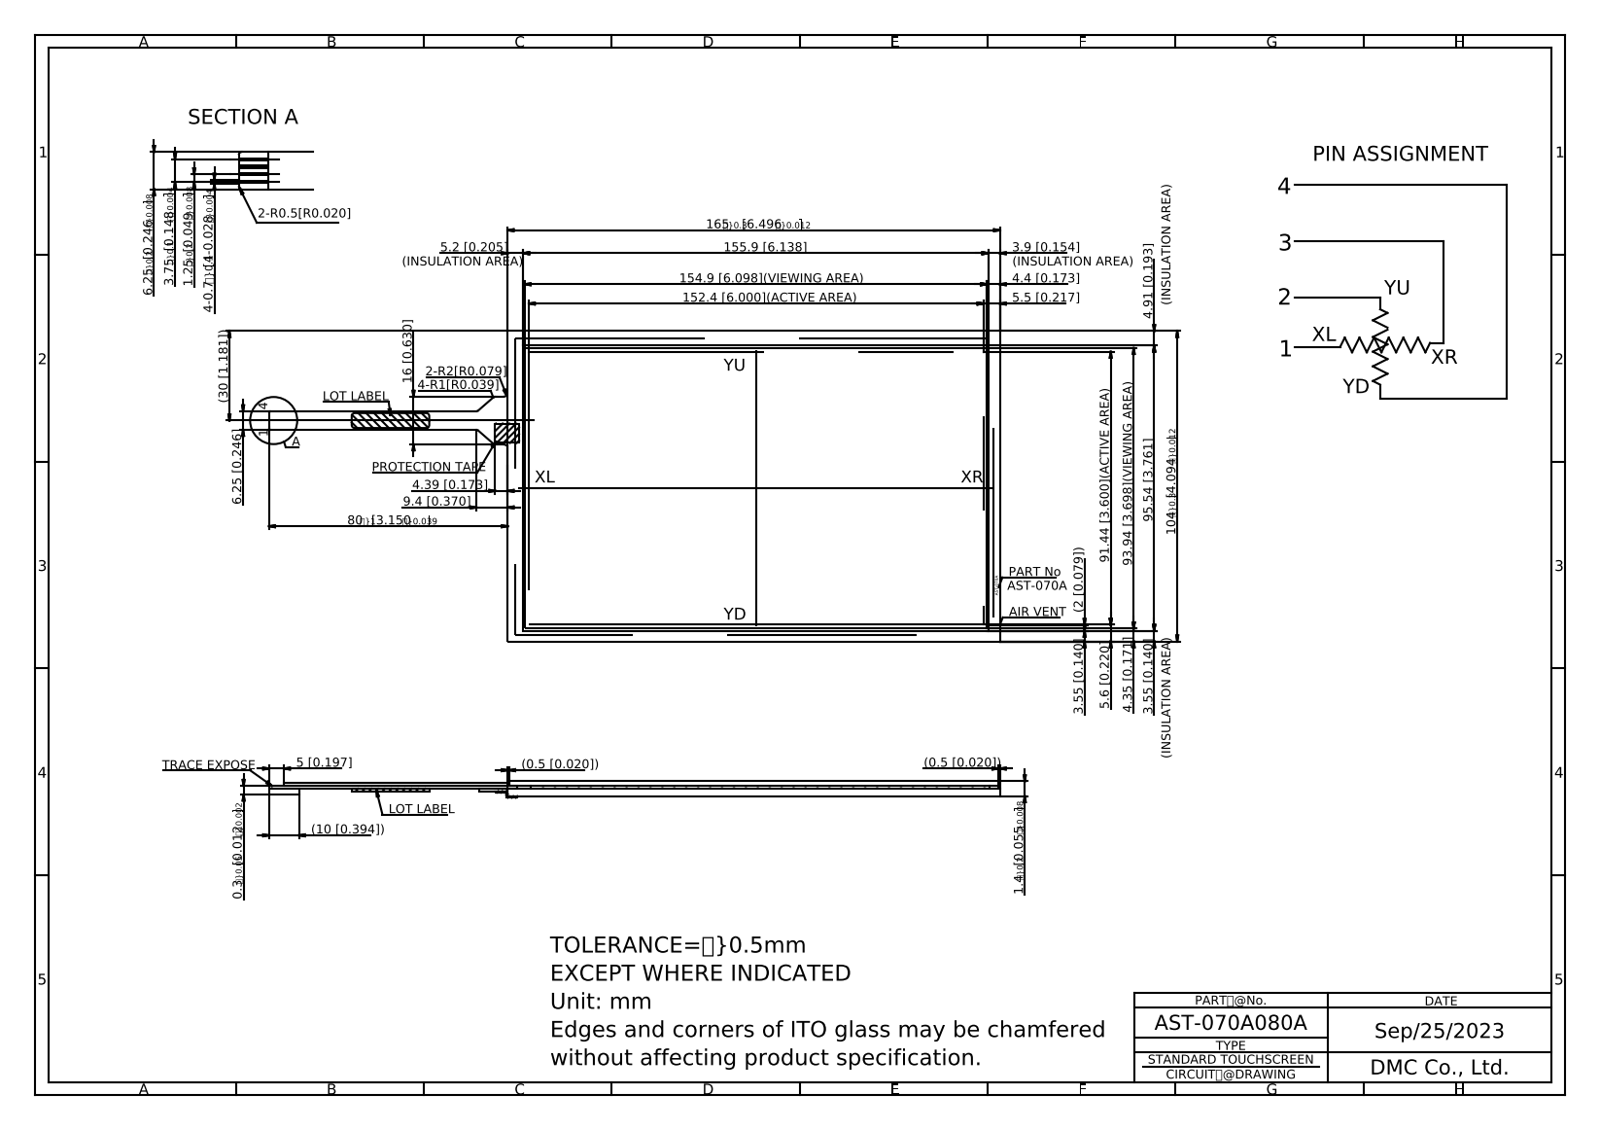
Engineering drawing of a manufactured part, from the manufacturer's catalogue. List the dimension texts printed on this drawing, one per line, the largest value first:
165.00
155.9 [6.138]
154.9 [6.098](VIEWING AREA)
152.4 [6.000](ACTIVE AREA)
104.00
95.54 [3.761]
93.94 [3.698](VIEWING AREA)
91.44 [3.600](ACTIVE AREA)
80.00
(30 [1.181])
16 [0.630]
(10 [0.394])
9.4 [0.370]
6.25{\H0.6667x;?}0.2}[0.246{\H0.6667x;?}0.008}]
6.25 [0.246]
5.6 [0.220]
5.5 [0.217]
5.2 [0.205]
5 [0.197]
4.91 [0.193]
4.4 [0.173]
4.39 [0.173]
4.35 [0.171]
4-0.7{\H0.83333x;?}0.1}[4-0.028{\H0.66667x;?}0.004}]
3.9 [0.154]
3.75{\H0.66667x;?}0.1}[0.148{\H0.66667x;?}0.004}]
3.55 [0.140]
3.55 [0.140]
(2 [0.079])
1.4{\H0.6667x;?}0.2}[0.055{\H0.6667x;?}0.008}]
1.25{\H0.66667x;?}0.2}[0.049{\H0.66667x;?}0.008}]
(0.5 [0.020])
(0.5 [0.020])
0.3{\H0.6667x;?}0.05}[0.012{\H0.6667x;?}0.002}]
